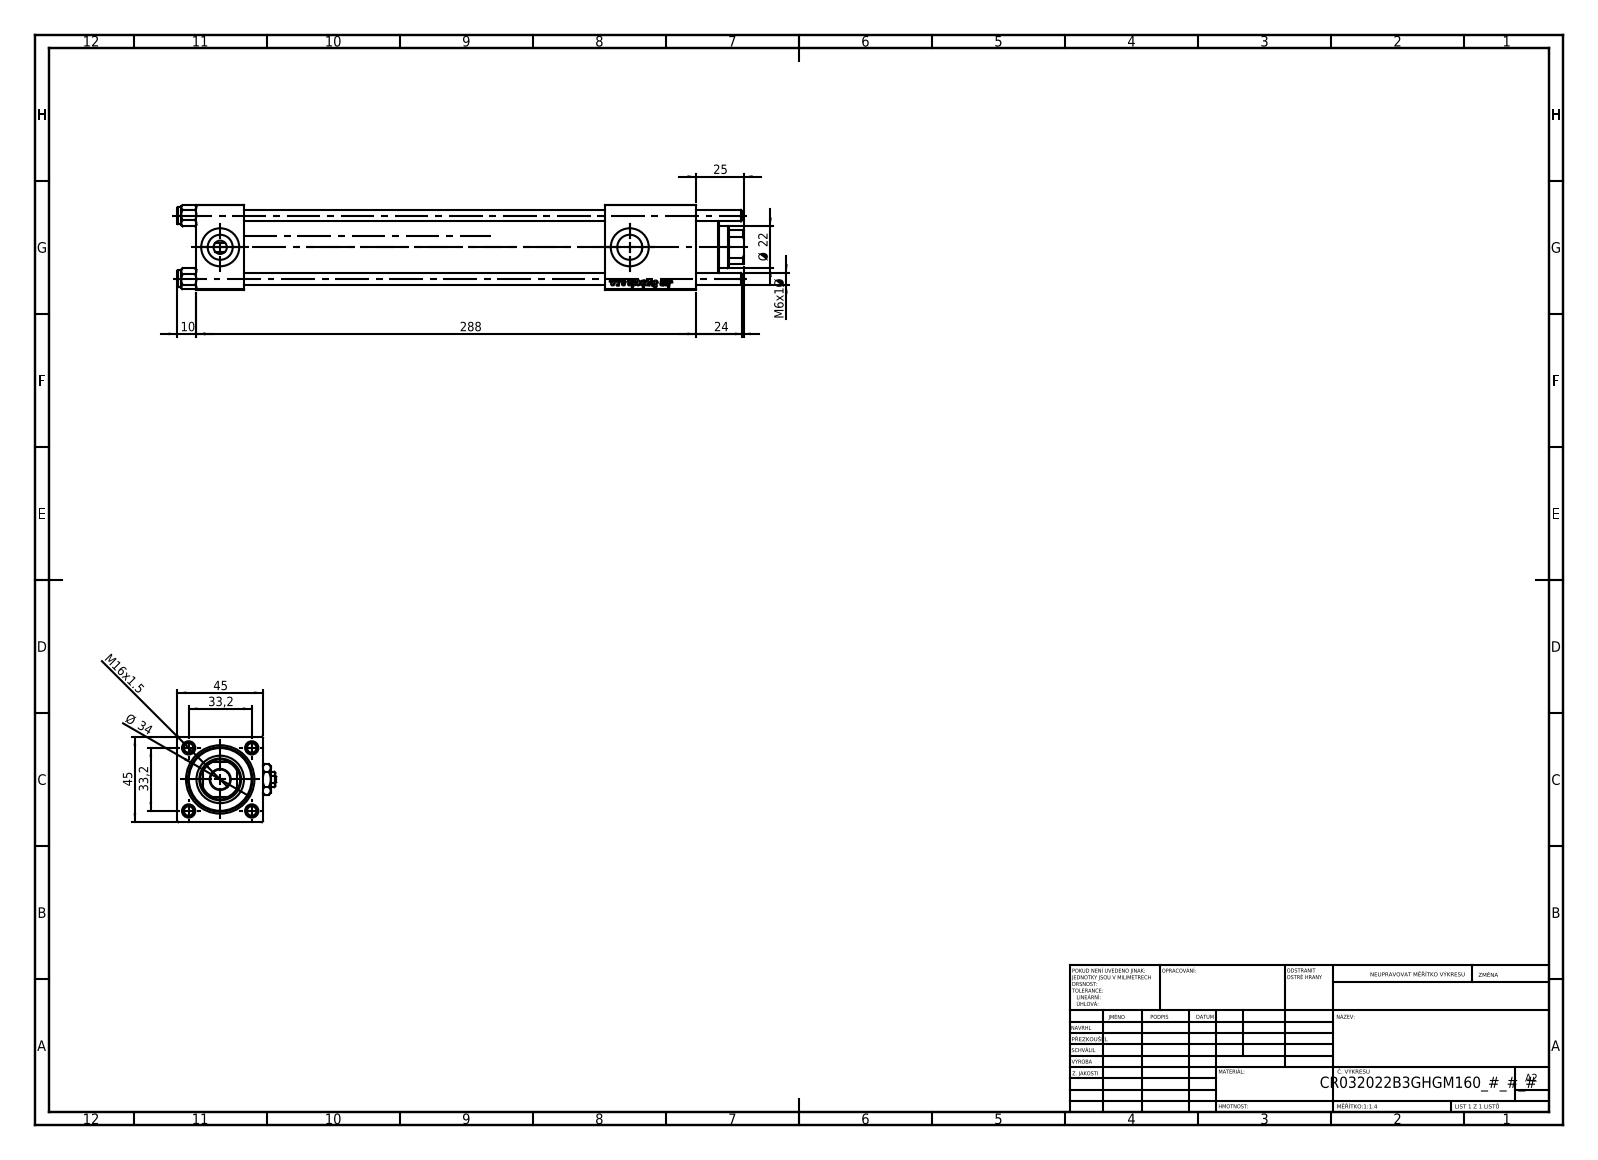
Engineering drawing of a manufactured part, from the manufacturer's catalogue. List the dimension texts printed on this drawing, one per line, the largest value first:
288
45
45
Ø 34
33,2
33,2
25
24
Ø 22
M16x1.5
10
M6x1 Ø
